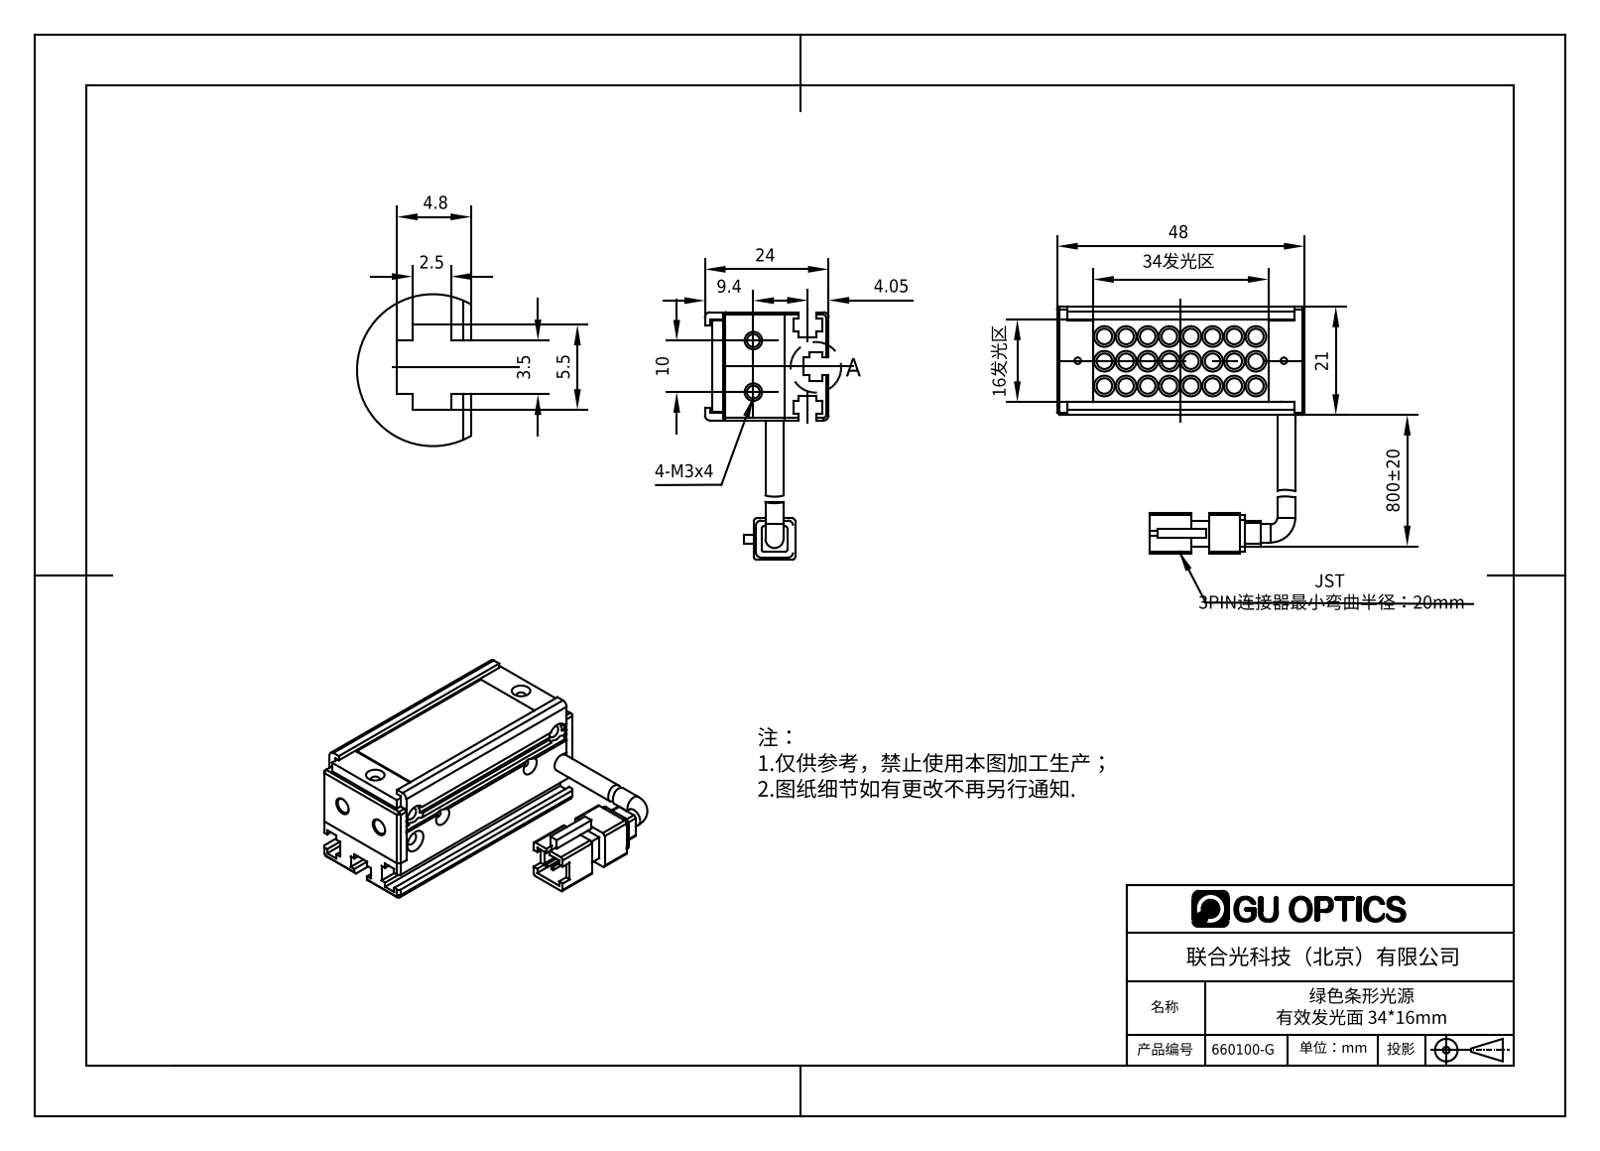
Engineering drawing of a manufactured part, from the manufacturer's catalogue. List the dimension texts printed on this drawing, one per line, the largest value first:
800±20
48
34发光区
24
21
16发光区
10
9.4
5.5
4.8
4.05
3.5
2.5
